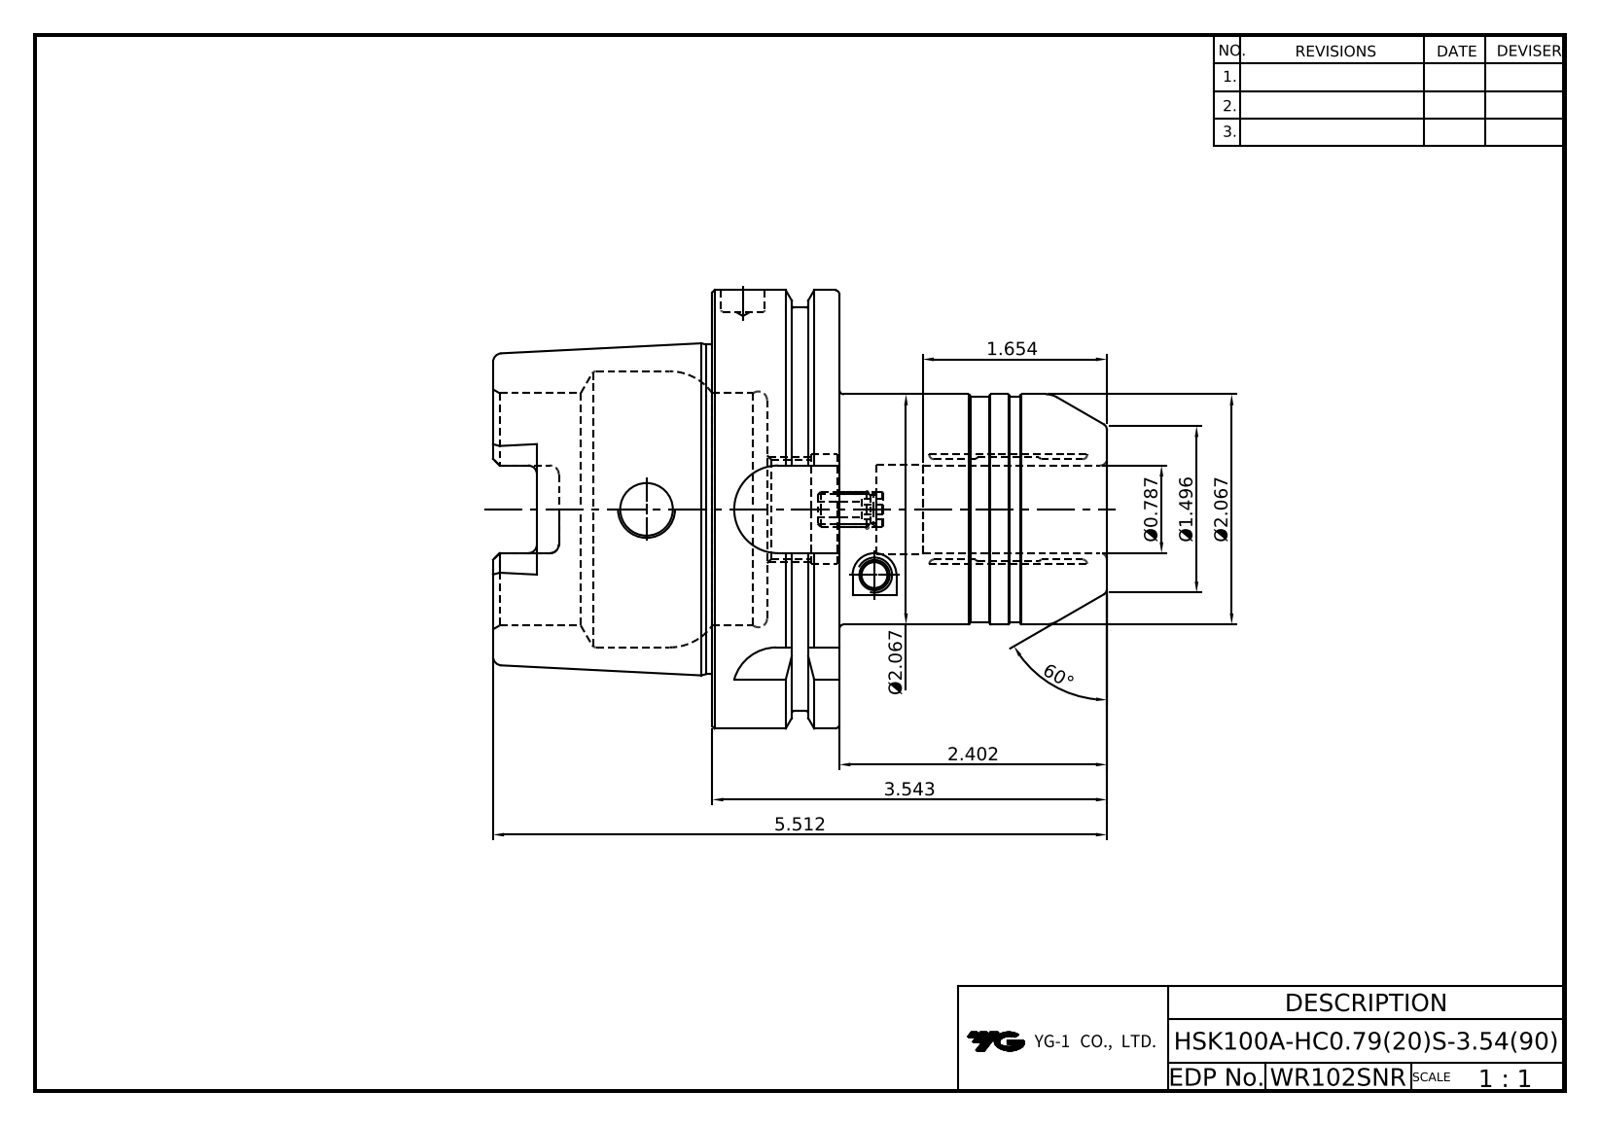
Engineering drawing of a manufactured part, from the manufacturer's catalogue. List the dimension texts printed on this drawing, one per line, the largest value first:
60°
5.512
3.543
2.402
Ø2.067
Ø2.067
1.654
Ø1.496
Ø0.787
